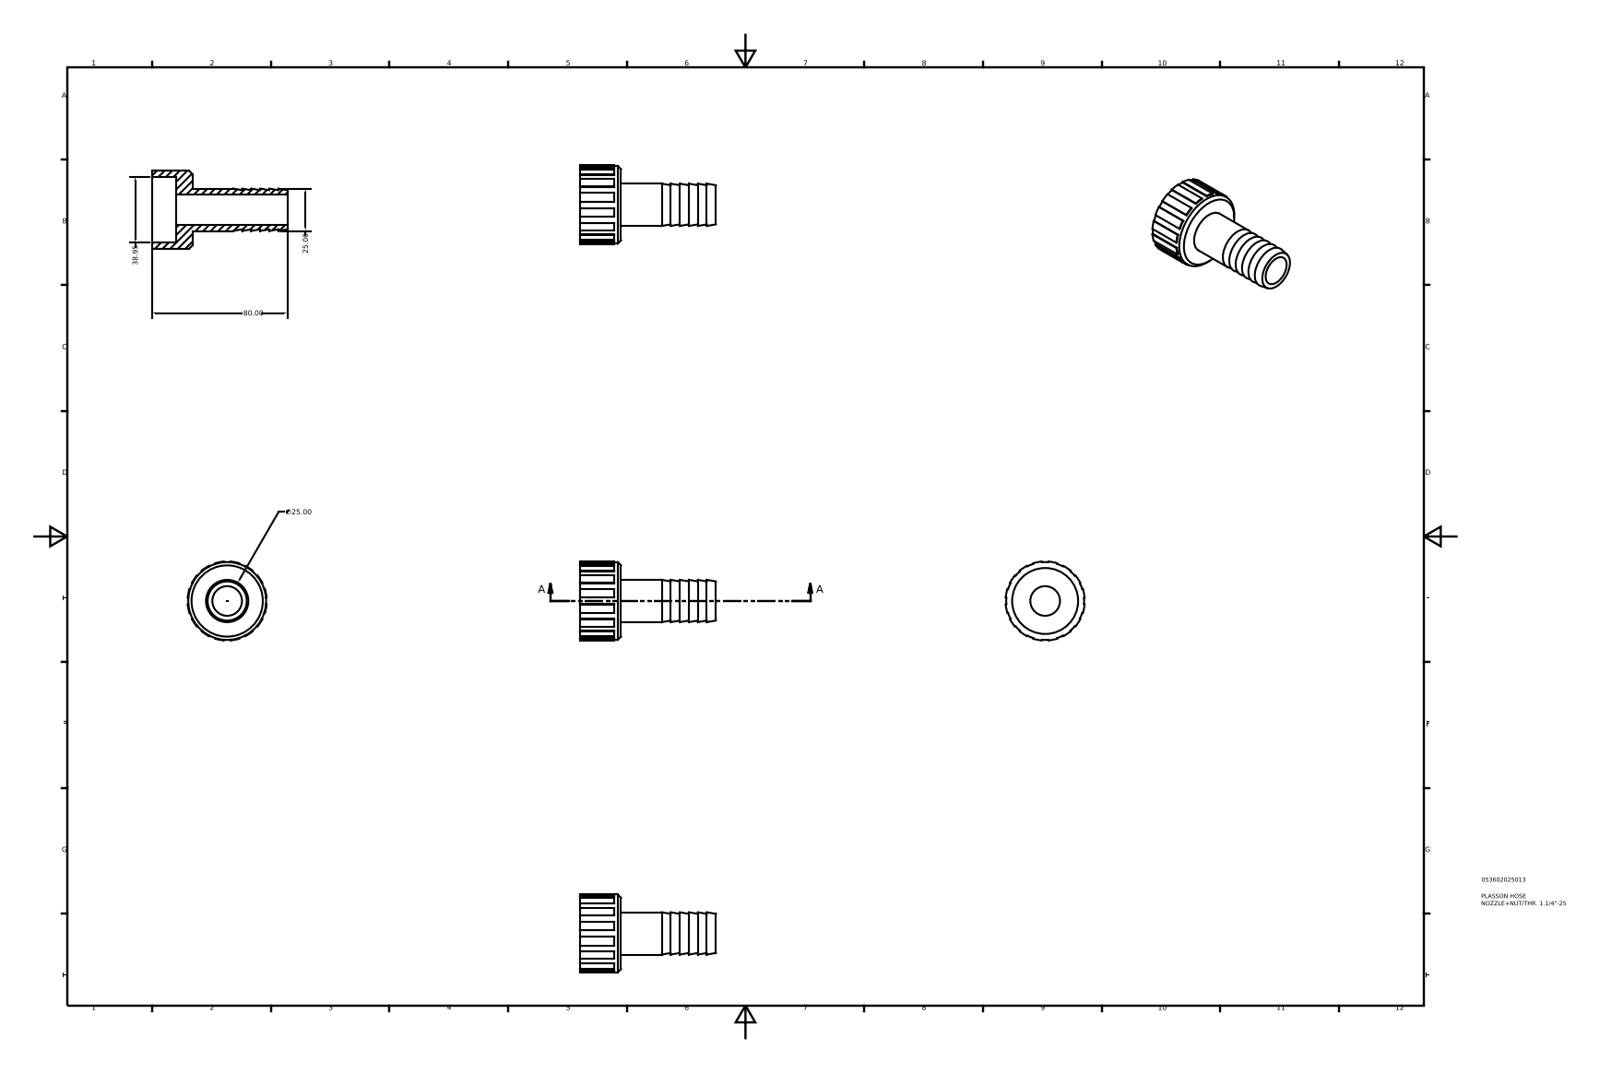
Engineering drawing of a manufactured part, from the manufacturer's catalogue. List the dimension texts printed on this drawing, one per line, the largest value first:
80.00
38.95
25.00
∅25.00
